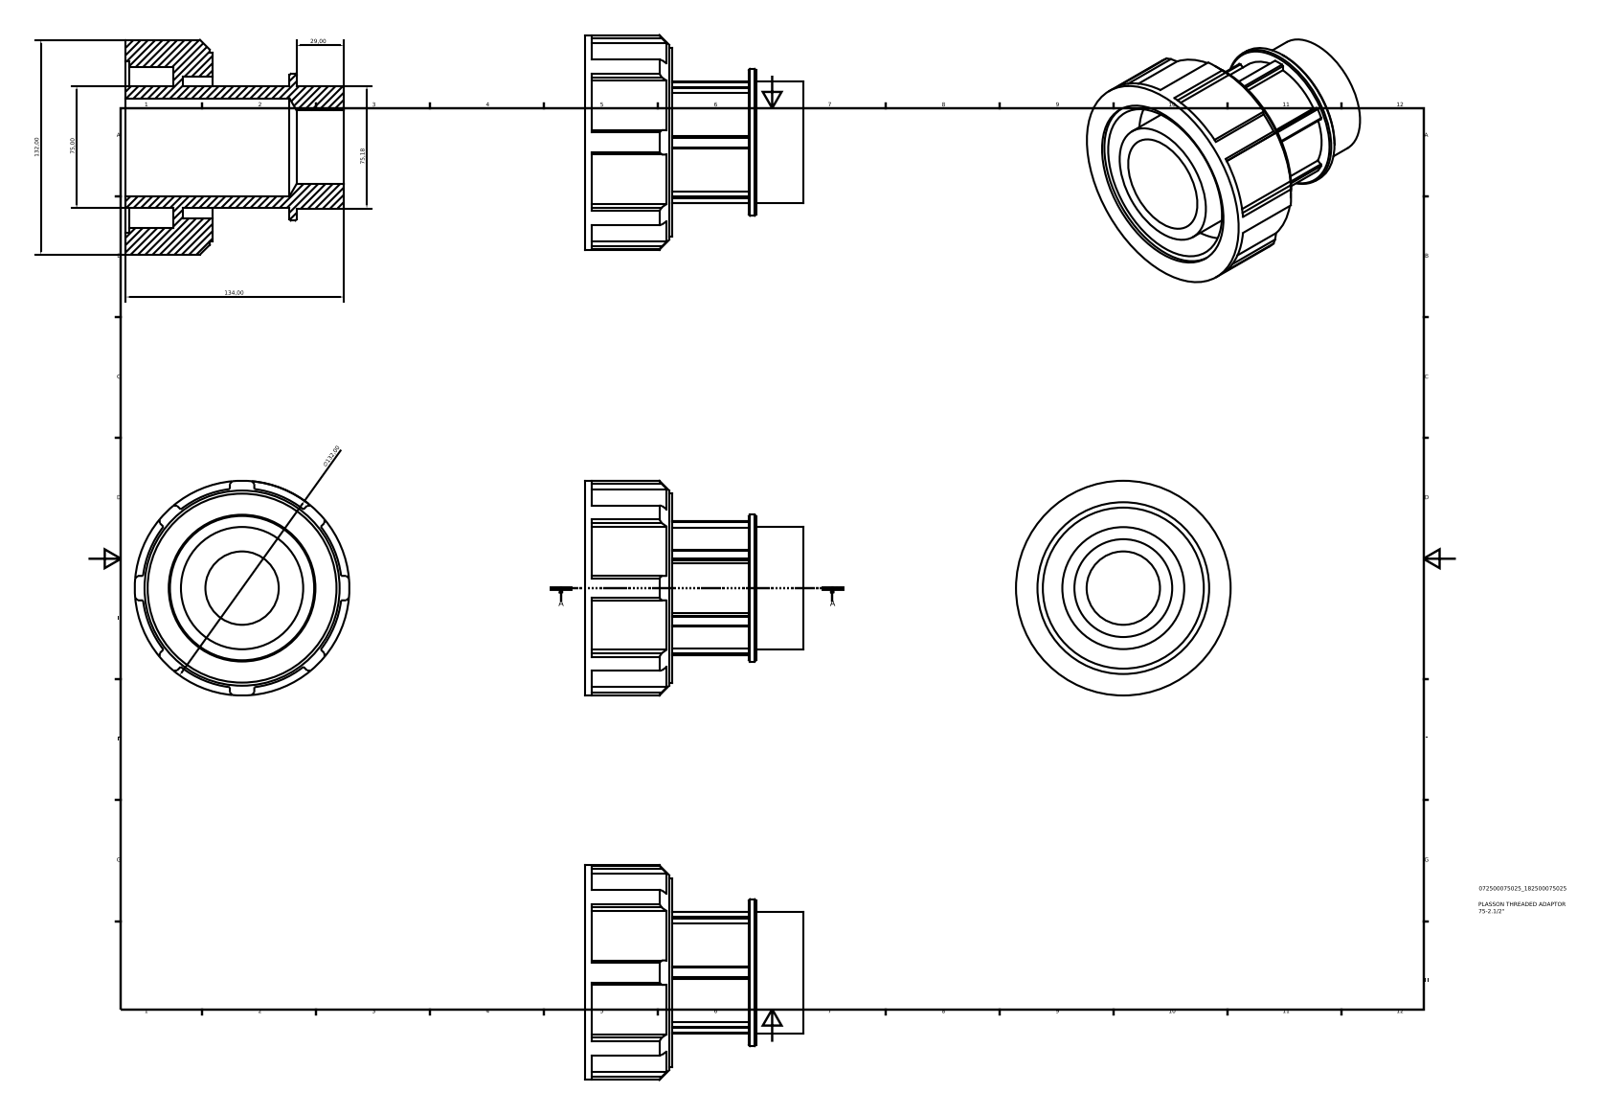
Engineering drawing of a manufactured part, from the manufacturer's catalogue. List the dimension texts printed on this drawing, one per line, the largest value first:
134,00
132,00
∅132,00
75,18
75,00
29,00
